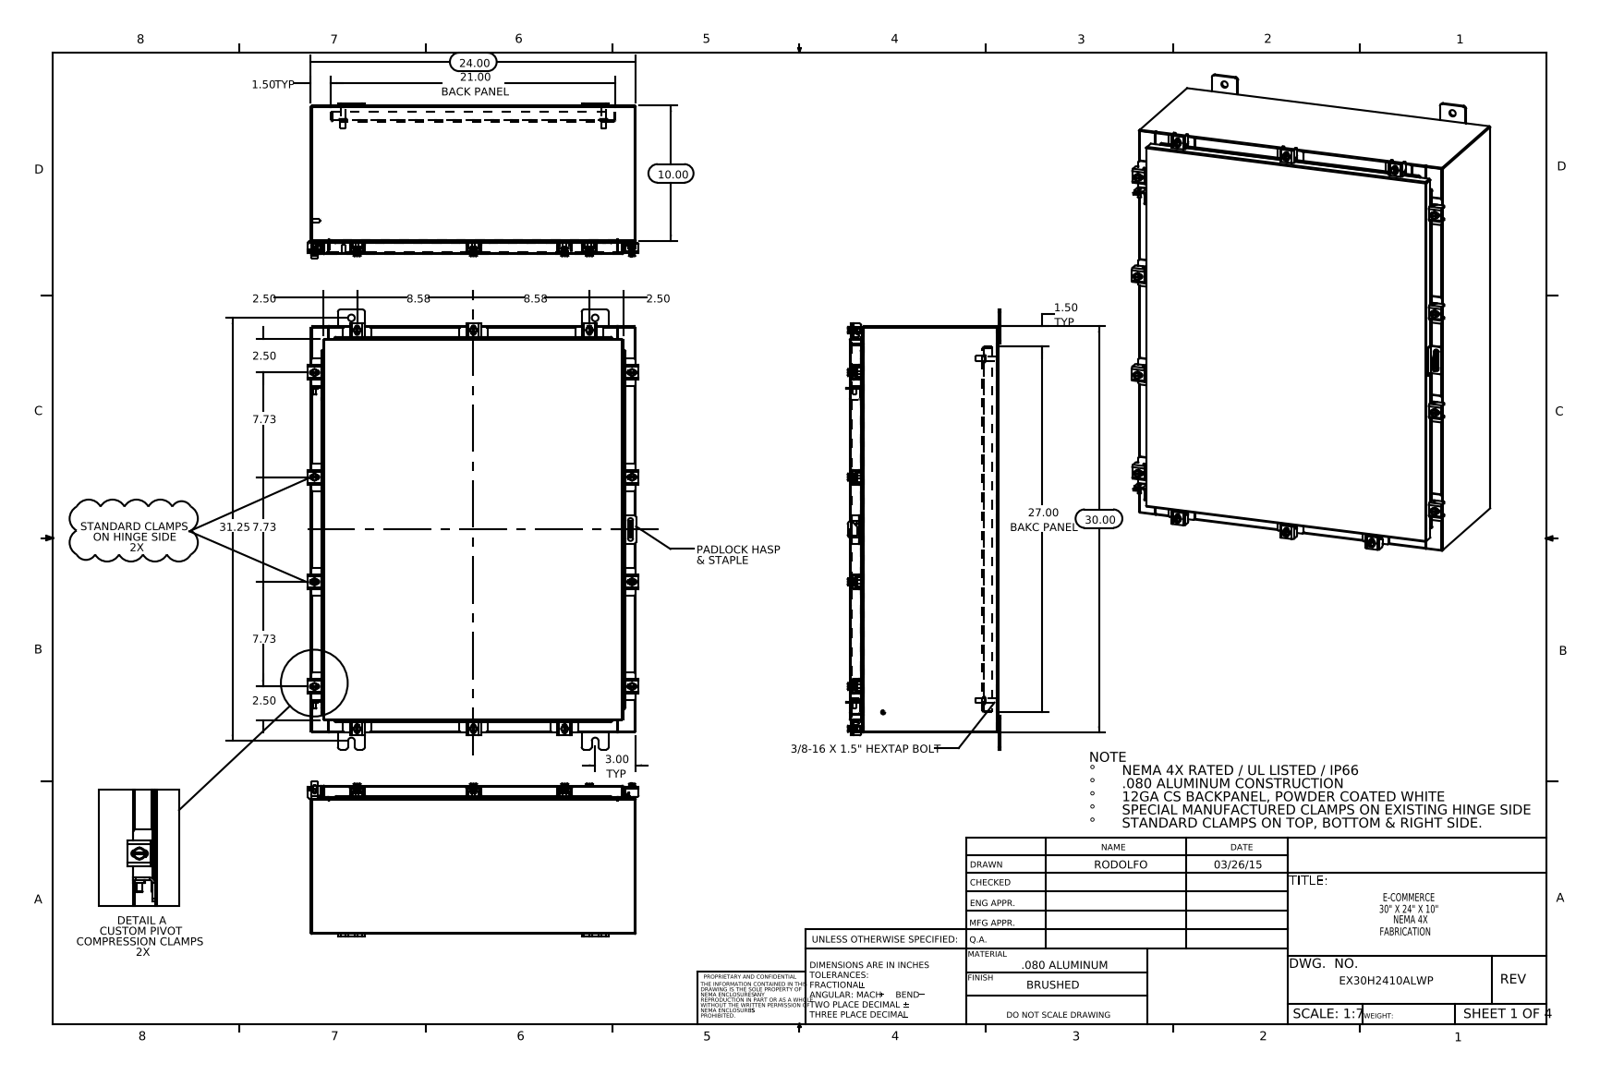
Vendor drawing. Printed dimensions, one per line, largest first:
31.25
30.00
27.00 BAKC PANEL
24.00
21.00 BACK PANEL
10.00
8.58
8.58
7.73
7.73
7.73
3.00 TYP
2.50
2.50
2.50
2.50
1.50 TYP
1.50 TYP
